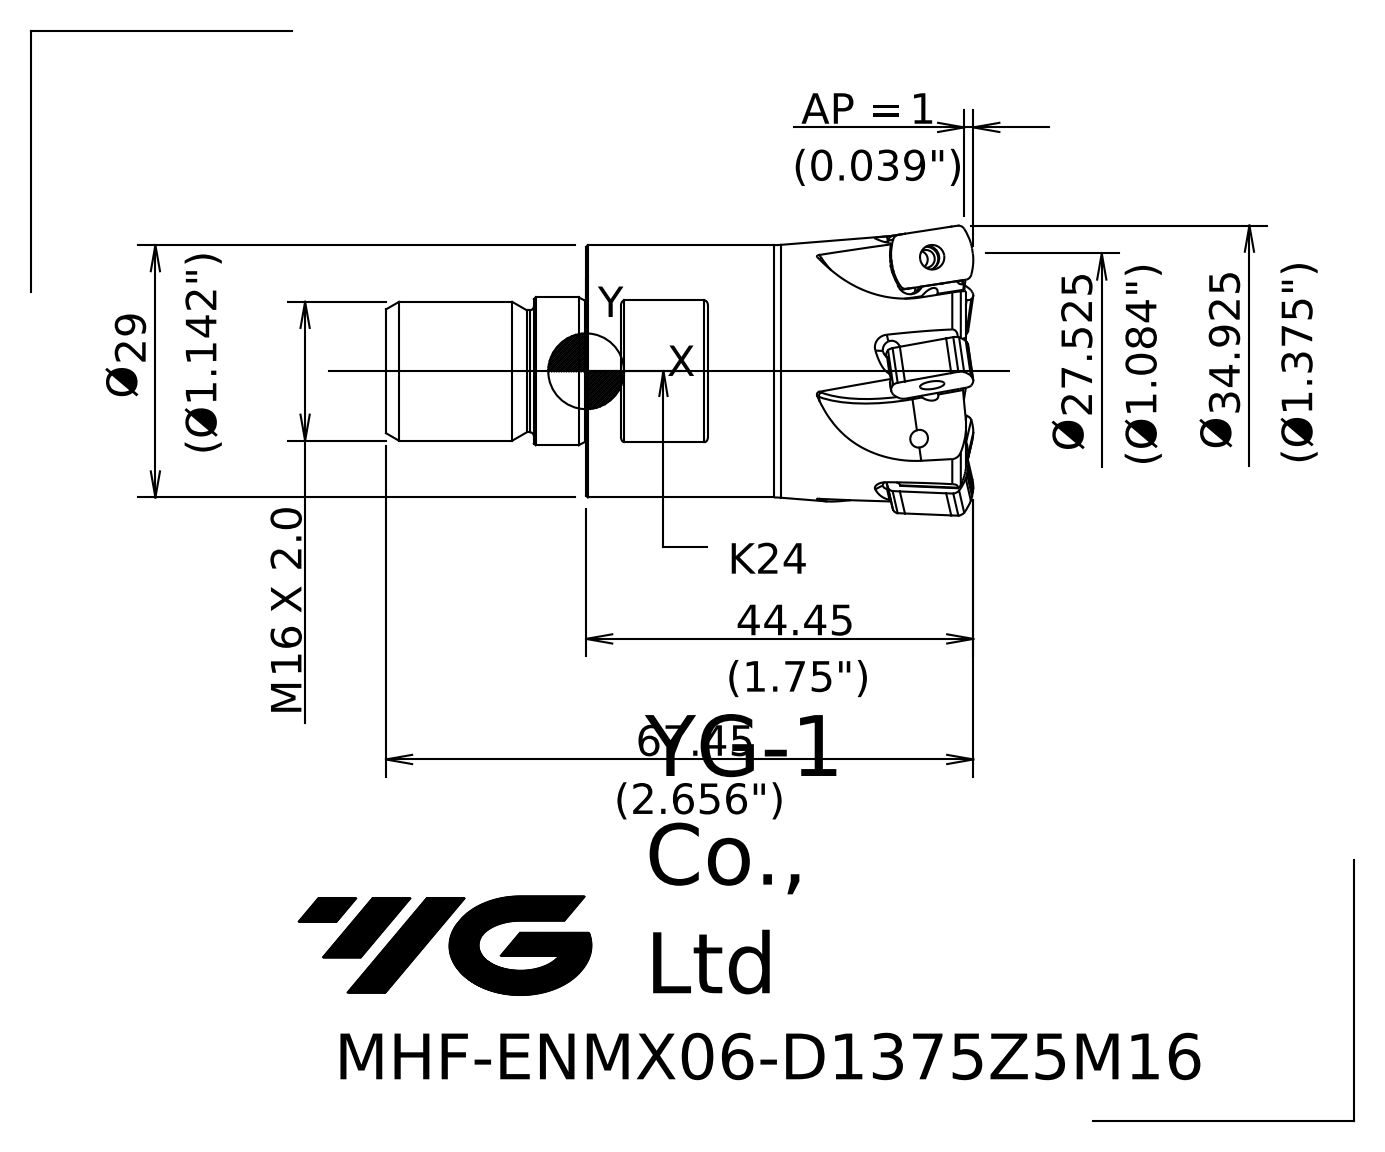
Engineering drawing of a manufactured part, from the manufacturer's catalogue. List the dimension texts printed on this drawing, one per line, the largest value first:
29 Ø
27.525 Ø
M X 2.0 16
